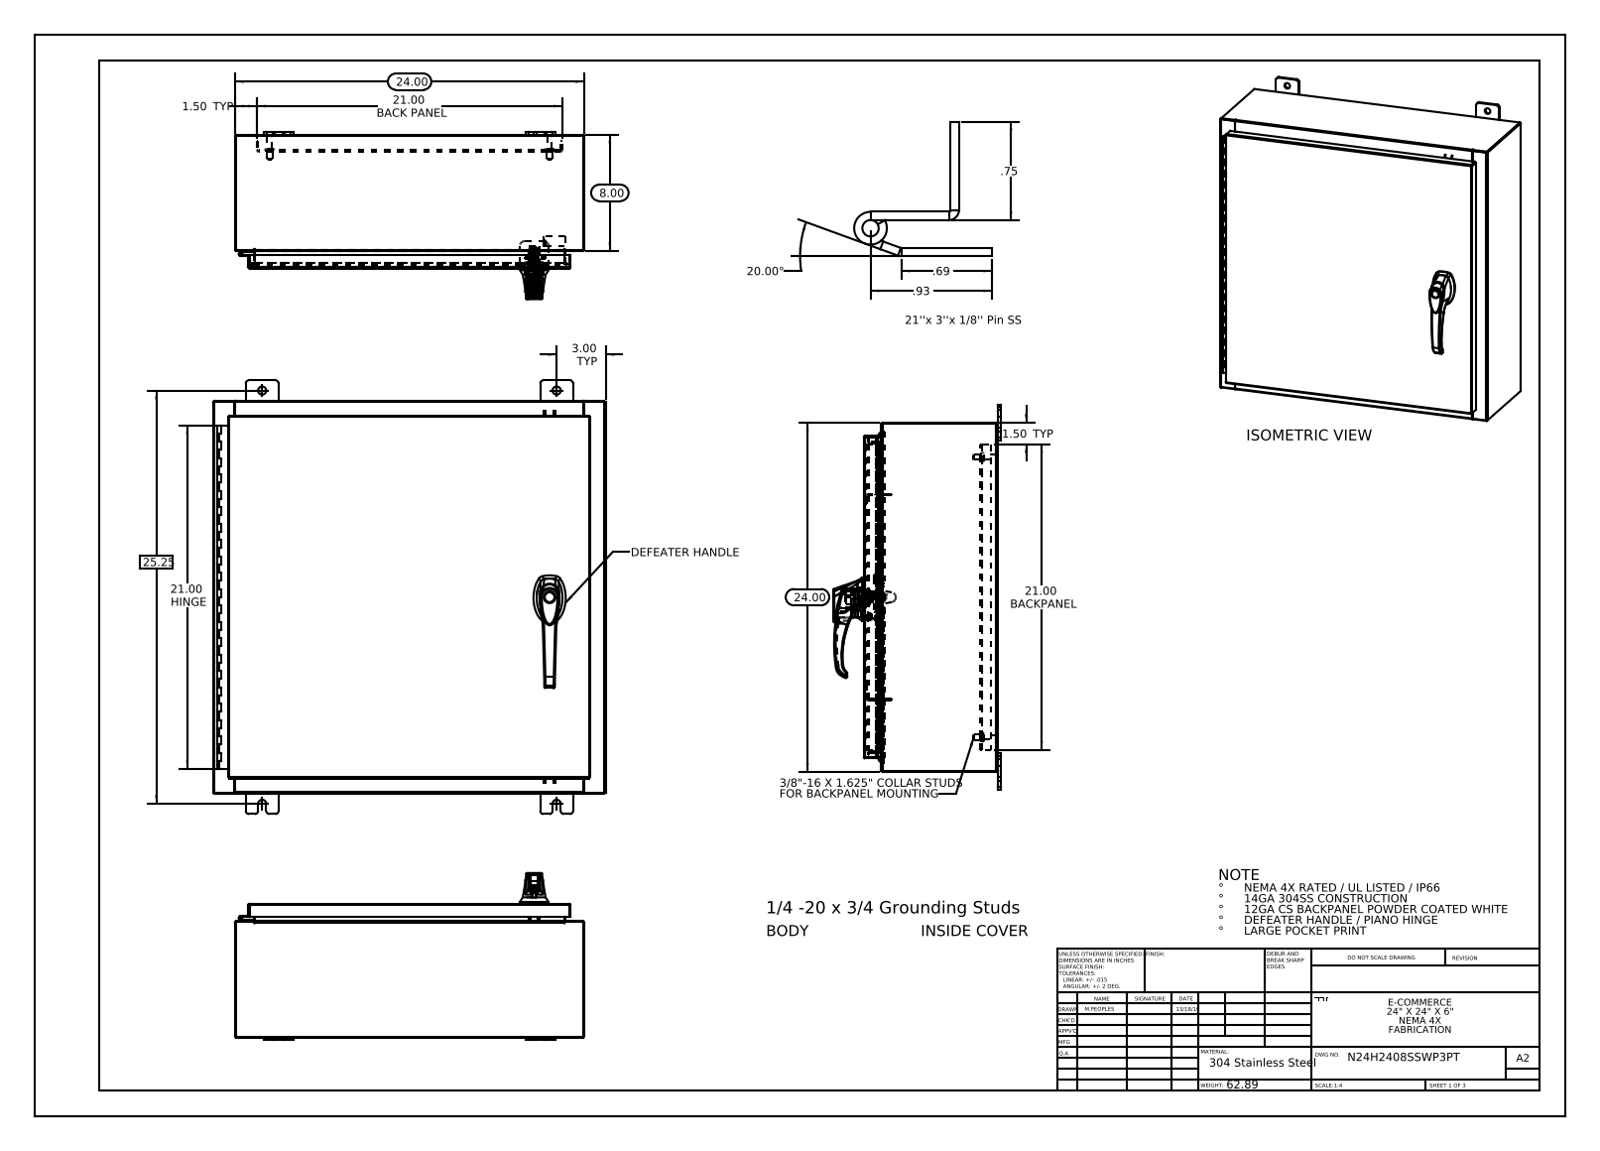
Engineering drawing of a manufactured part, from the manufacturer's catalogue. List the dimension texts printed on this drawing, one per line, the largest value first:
25.25
24.00
24.00
21.00 HINGE
21.00 BACK PANEL
21.00 BACKPANEL
20.00°
8.00
3.00 TYP
1.50 TYP
1.50 TYP
.93
.75
.69
